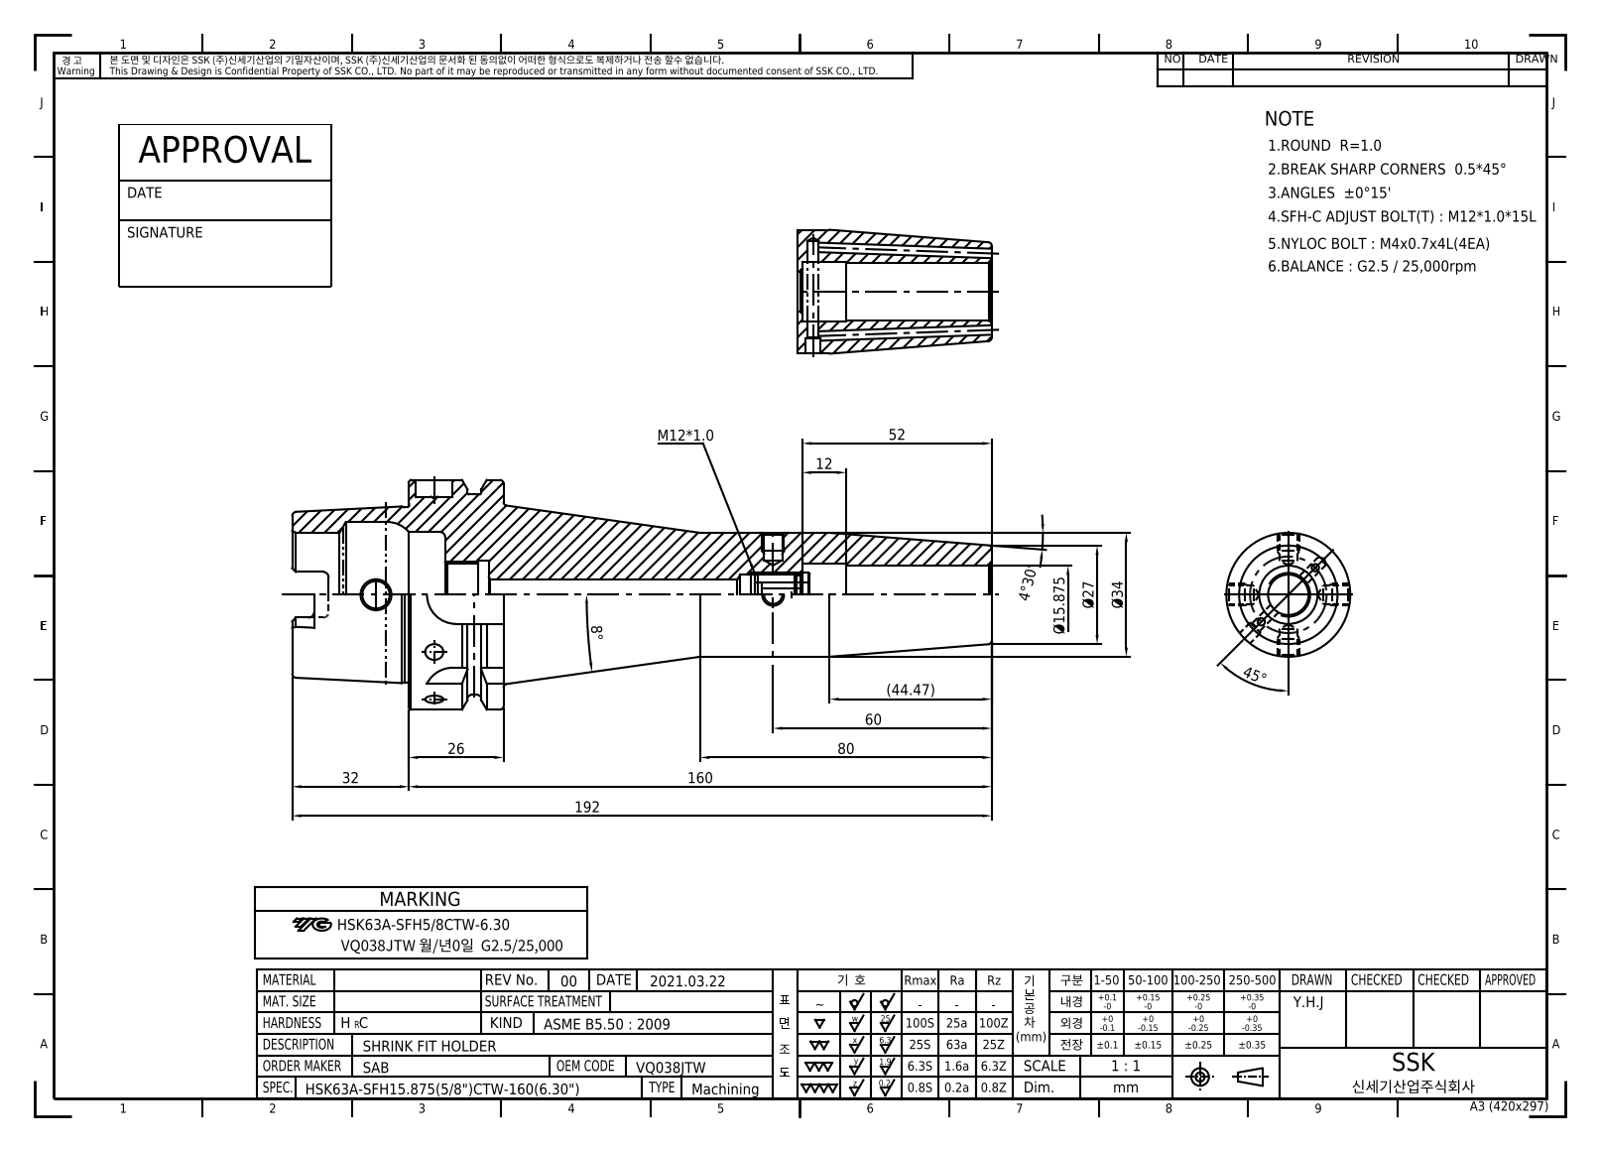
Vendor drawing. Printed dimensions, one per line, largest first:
192
160
80
60
52
45°
(44.47)
Ø34
32
Ø27
26
Ø15.875
12
8°
4°30'
